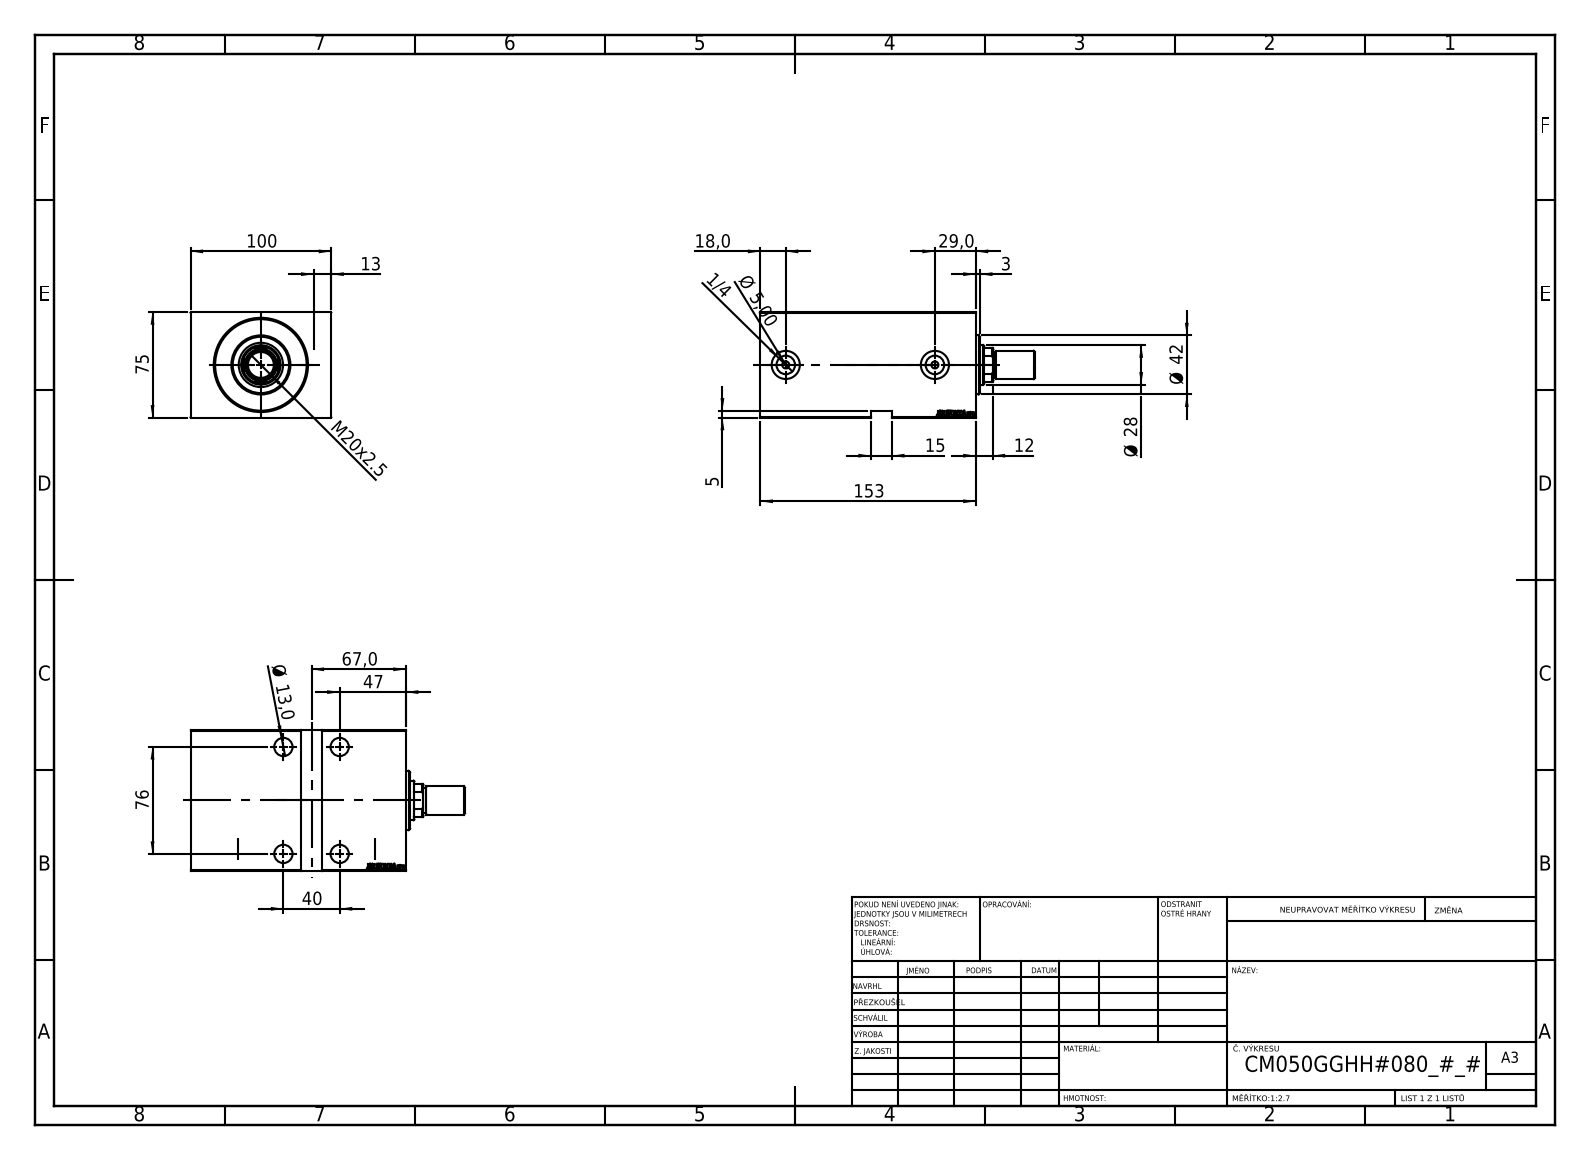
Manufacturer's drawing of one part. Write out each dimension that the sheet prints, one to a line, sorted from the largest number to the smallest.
153
100
76
75
67,0
47
Ø 42
40
29,0
Ø 28
M20x2.5
18,0
15
13
Ø 13,0
12
Ø 5,00
5
3
1/4
